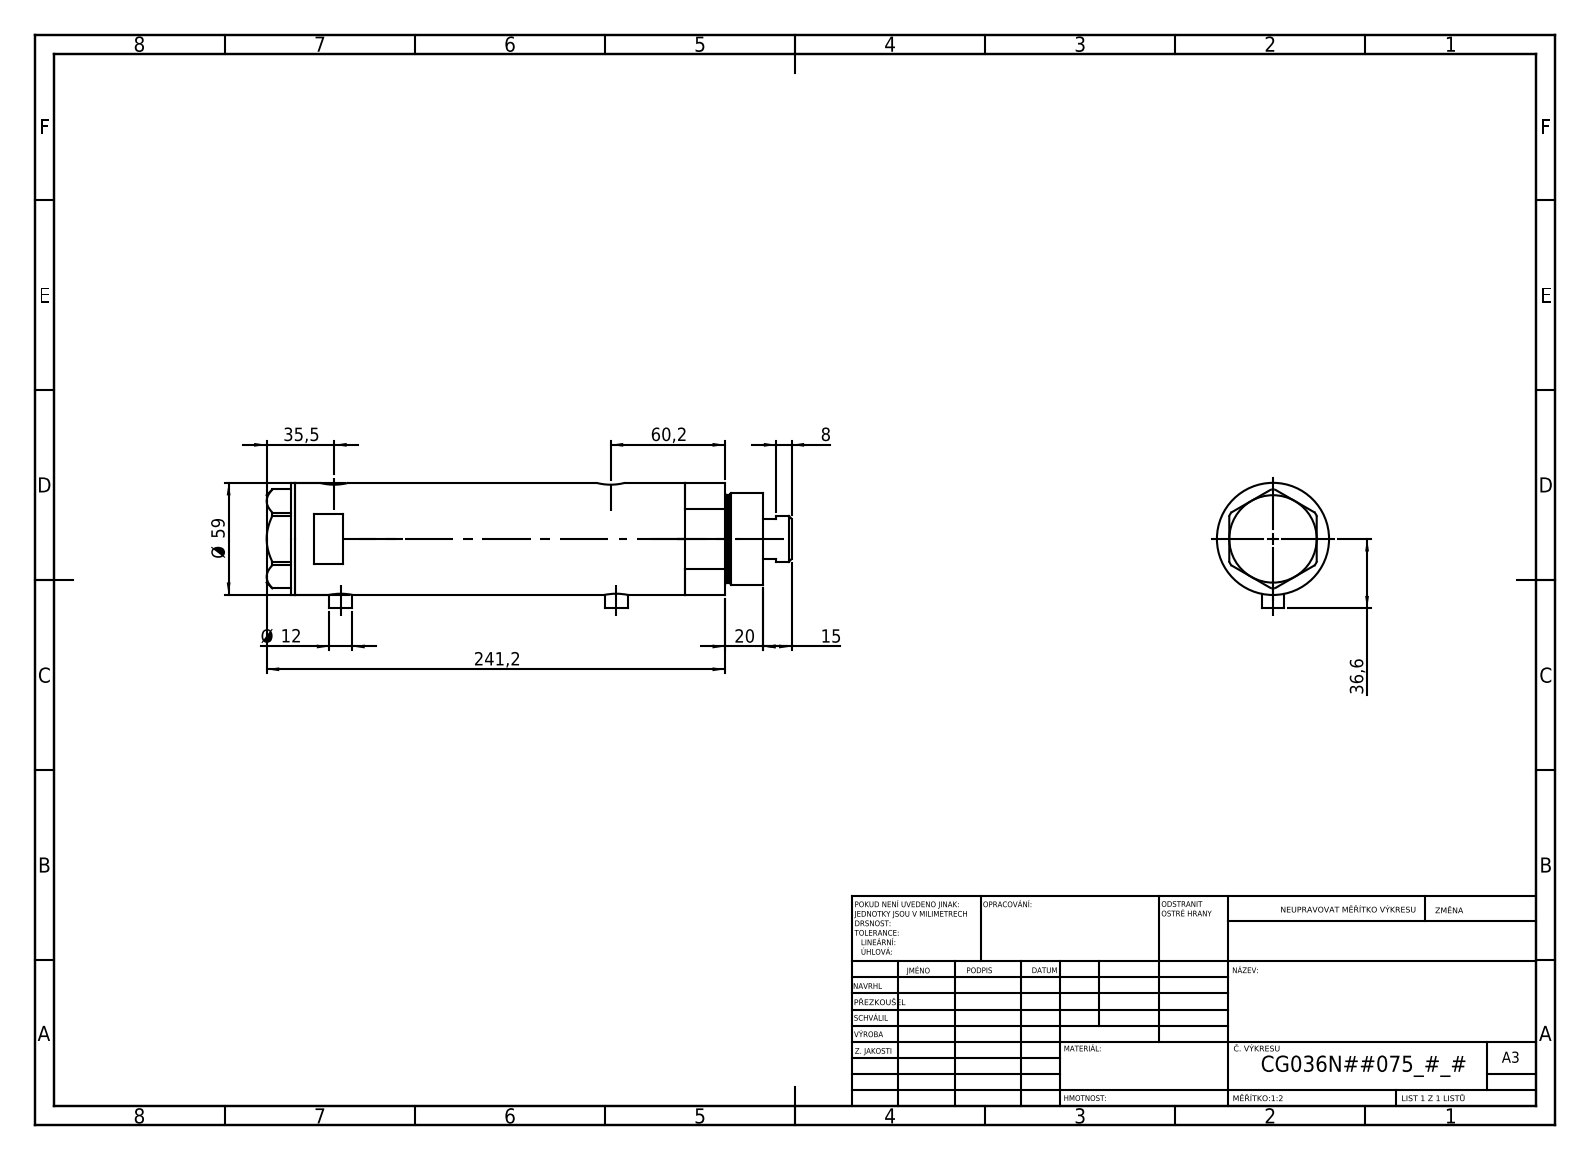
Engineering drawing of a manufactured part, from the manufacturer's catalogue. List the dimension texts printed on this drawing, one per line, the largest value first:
241,2
60,2
Ø 59
36,6
35,5
20
15
Ø 12
8
